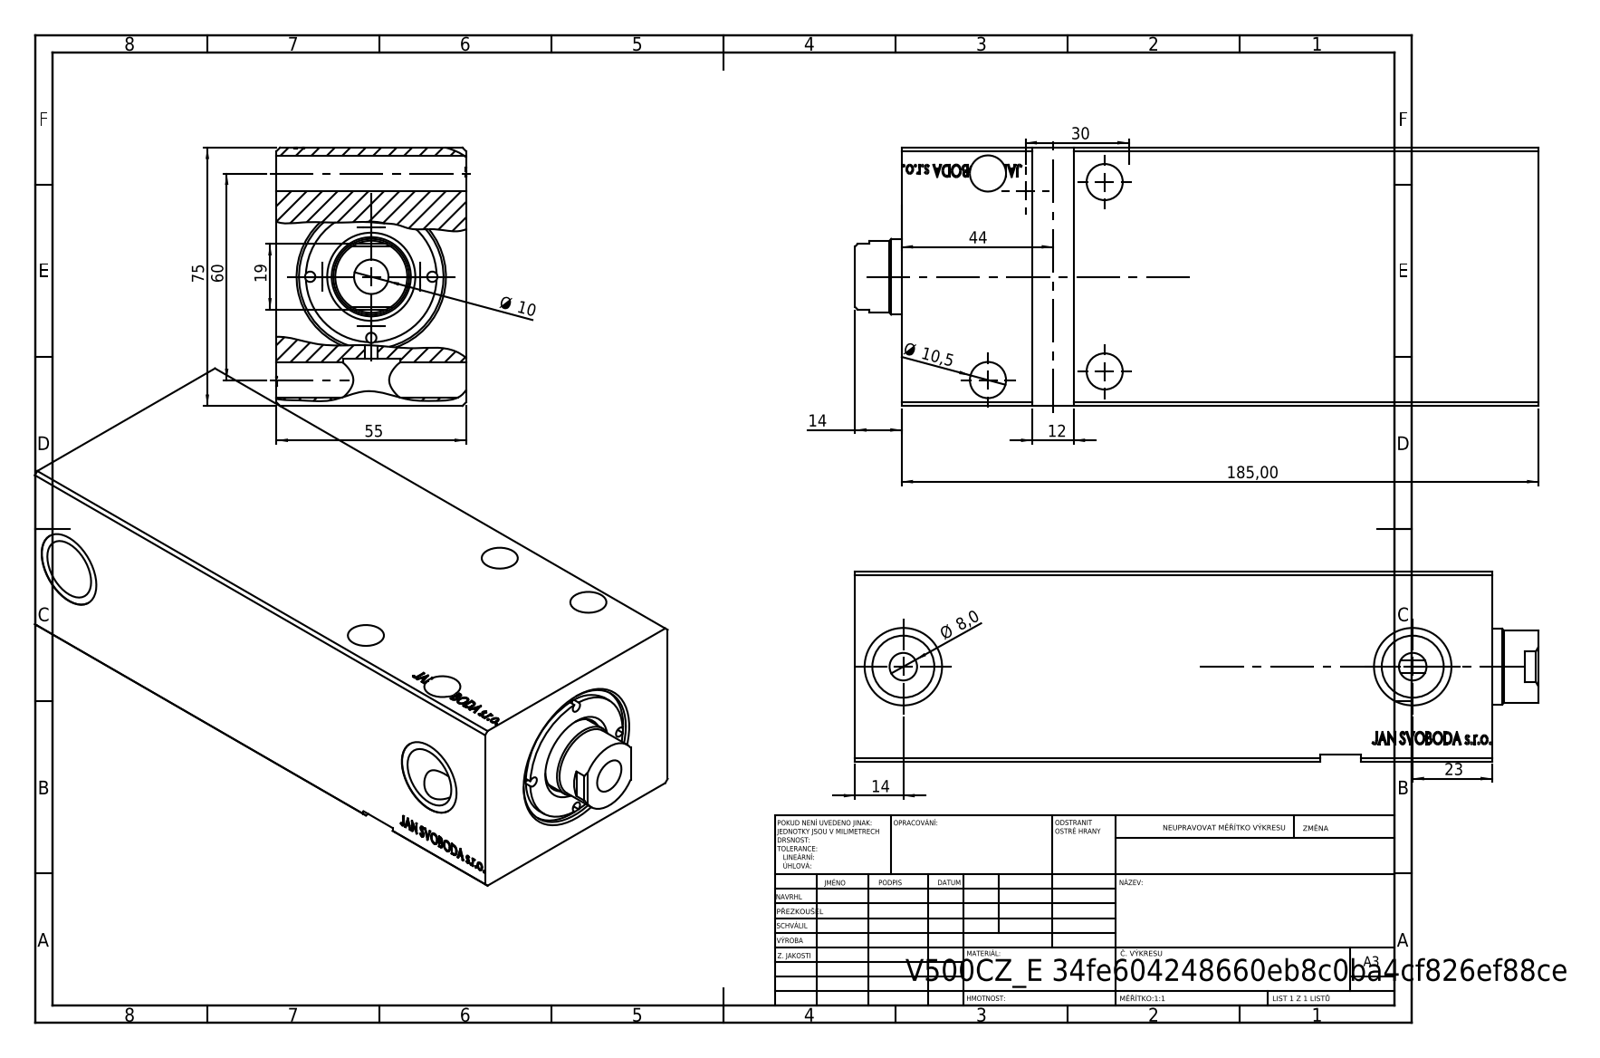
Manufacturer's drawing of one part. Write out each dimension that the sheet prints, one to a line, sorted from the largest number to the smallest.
185,00
75
60
55
44
30
23
19
14
14
12
Ø 10,5
Ø 10
Ø 8,0
